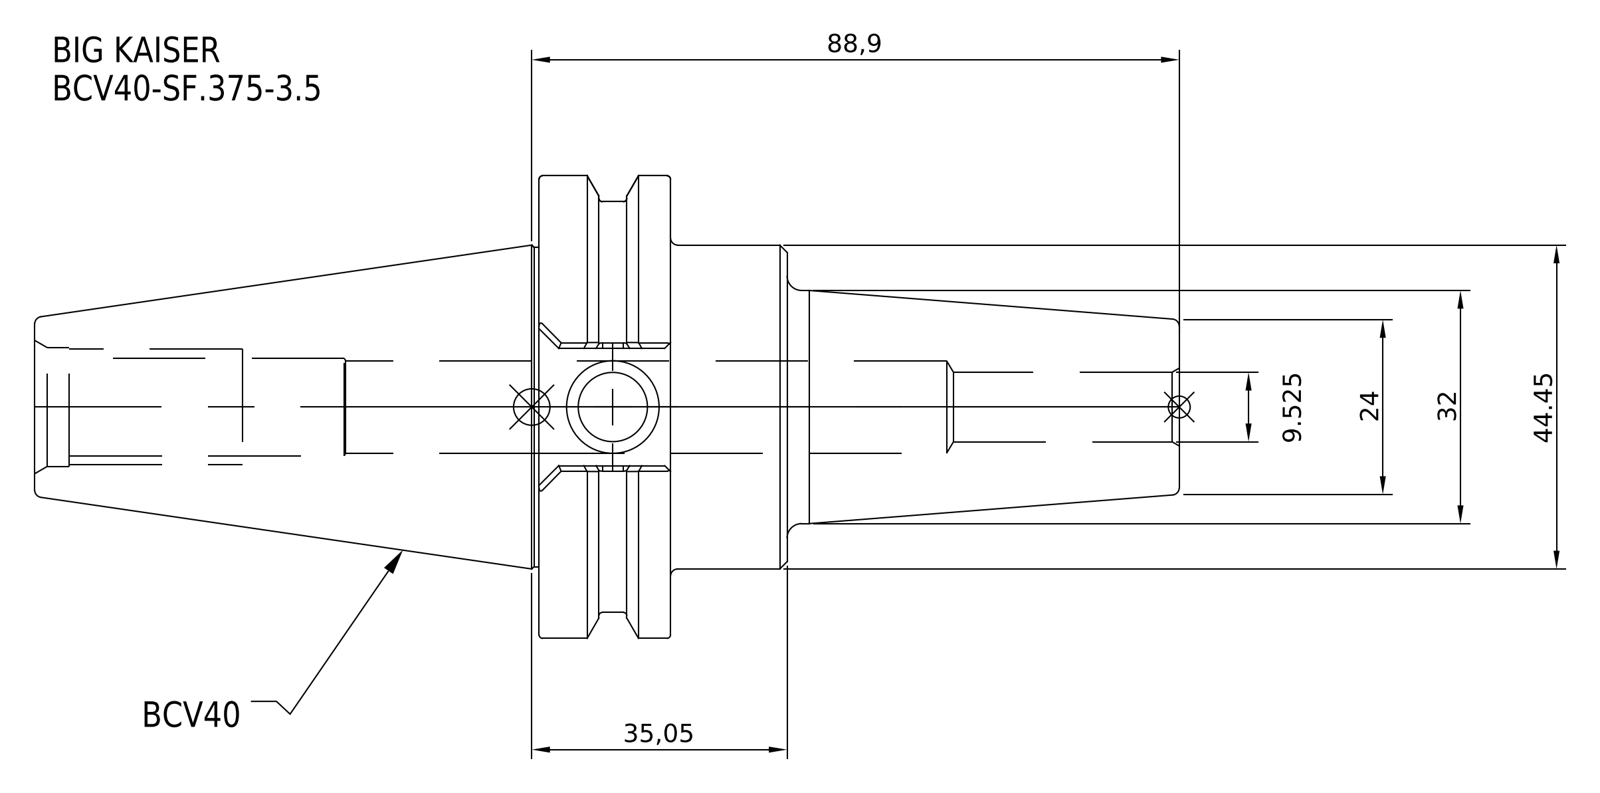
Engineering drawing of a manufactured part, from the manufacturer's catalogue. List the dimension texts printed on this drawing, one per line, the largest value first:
88,9
44.45
35,05
32
24
9.525
